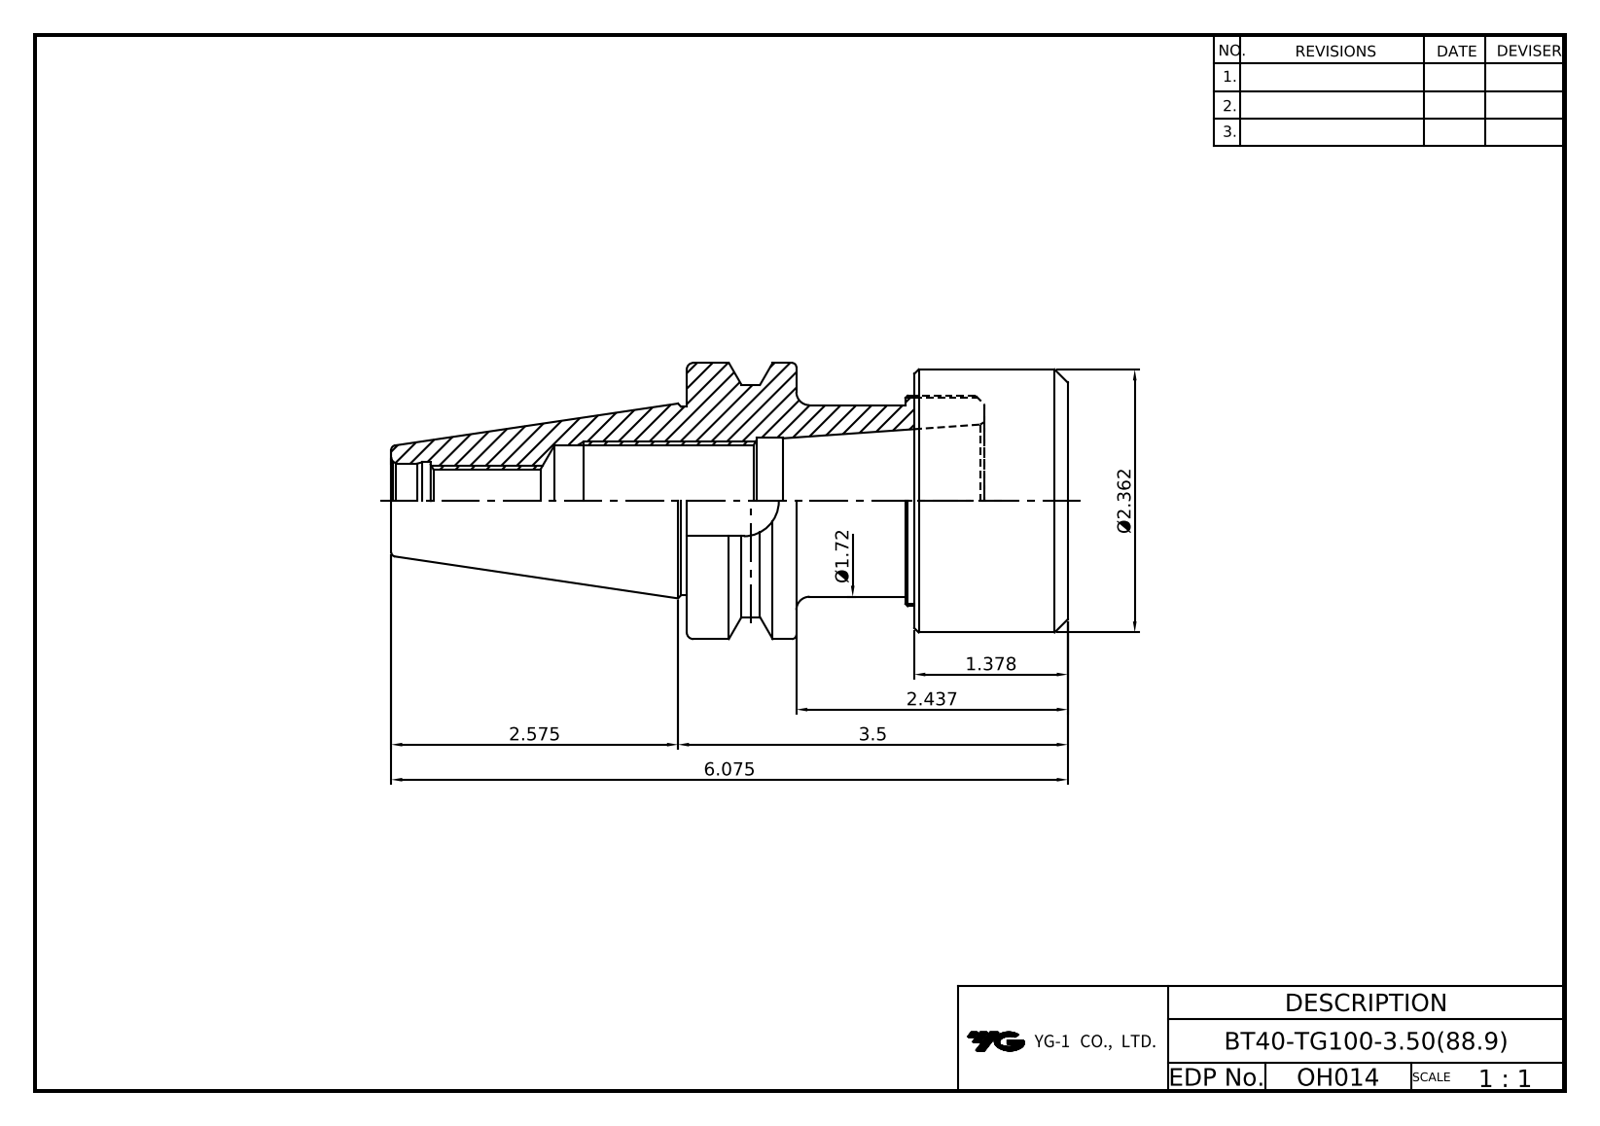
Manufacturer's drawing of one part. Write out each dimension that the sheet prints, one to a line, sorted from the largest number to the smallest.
6.075
3.5
2.575
2.437
Ø2.362
Ø1.72
1.378
